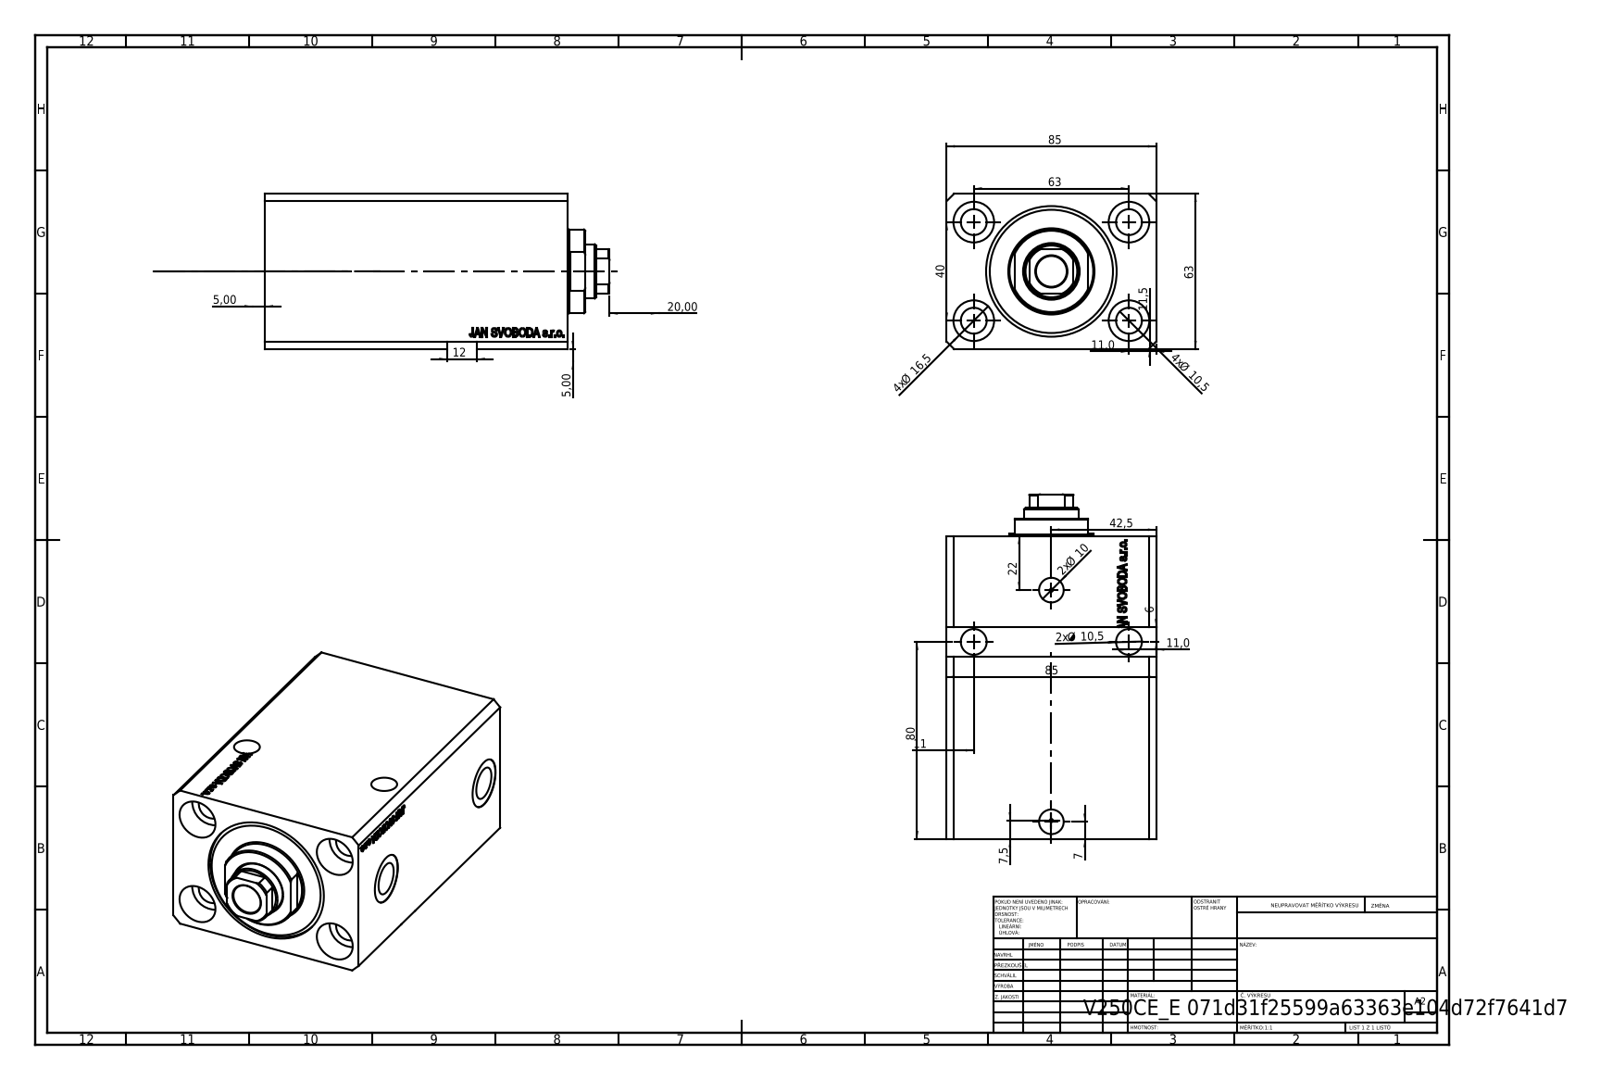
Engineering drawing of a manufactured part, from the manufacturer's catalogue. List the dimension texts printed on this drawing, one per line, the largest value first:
85
85
80
63
63
42,5
40
22
20,00
4x Ø 16,5
12
11,5
11,0
11,0
11
4x Ø 10,5
2x Ø 10,5
2x Ø 10
7,5
7
6
5,00
5,00
